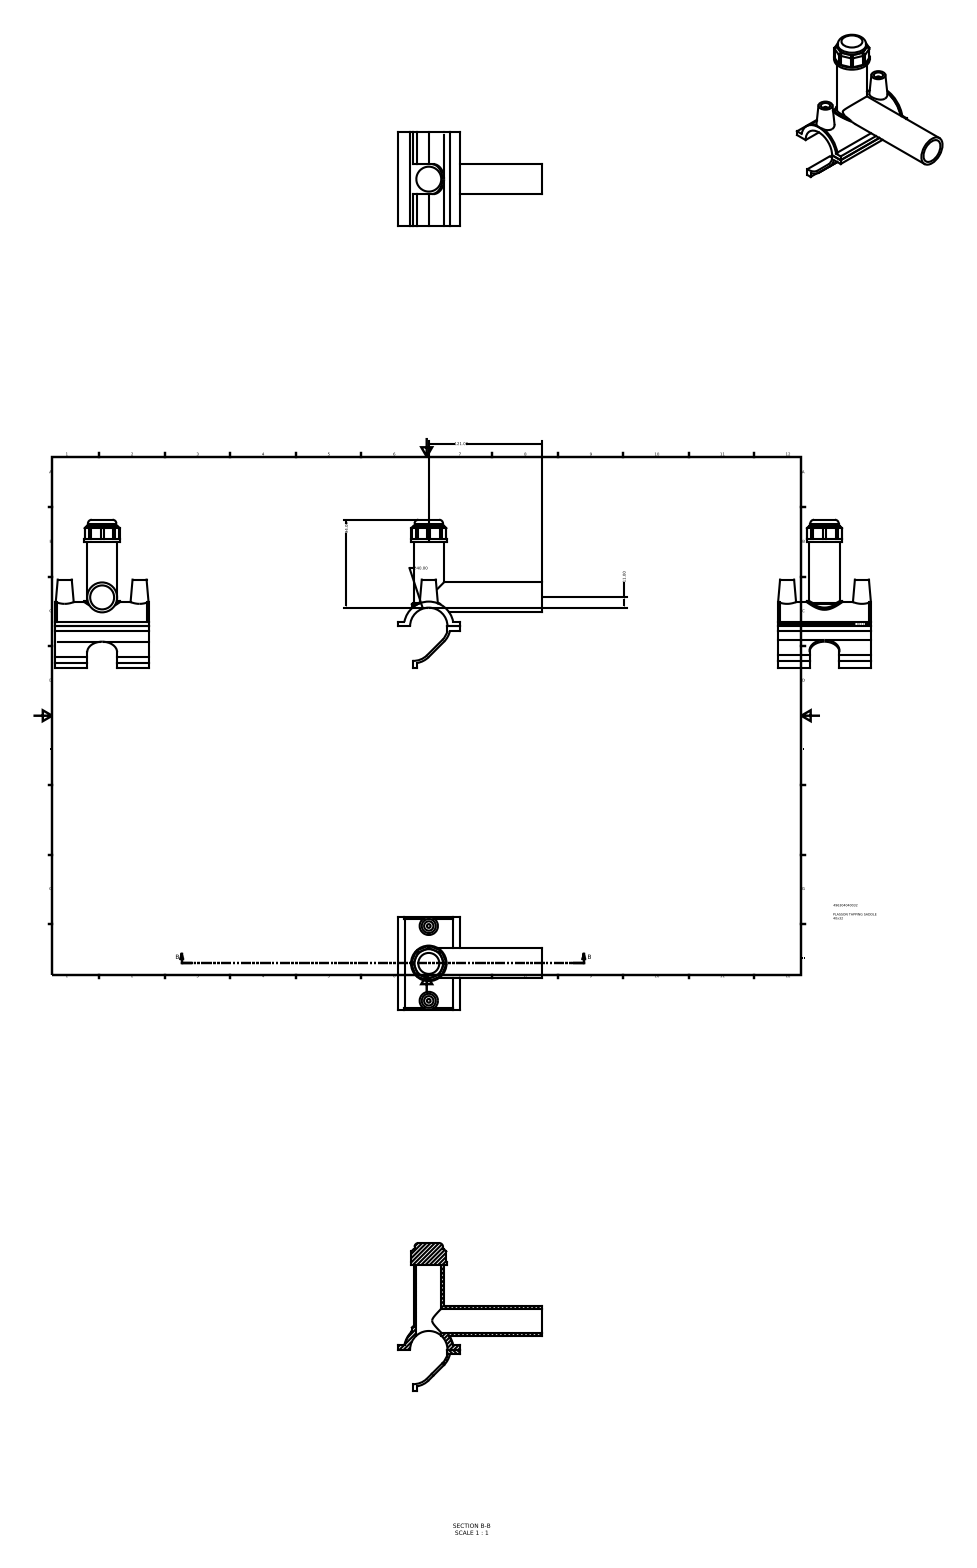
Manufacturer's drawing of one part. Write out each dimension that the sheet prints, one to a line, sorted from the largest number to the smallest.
121.00
100.00
94.00
∅40.00
11.00
